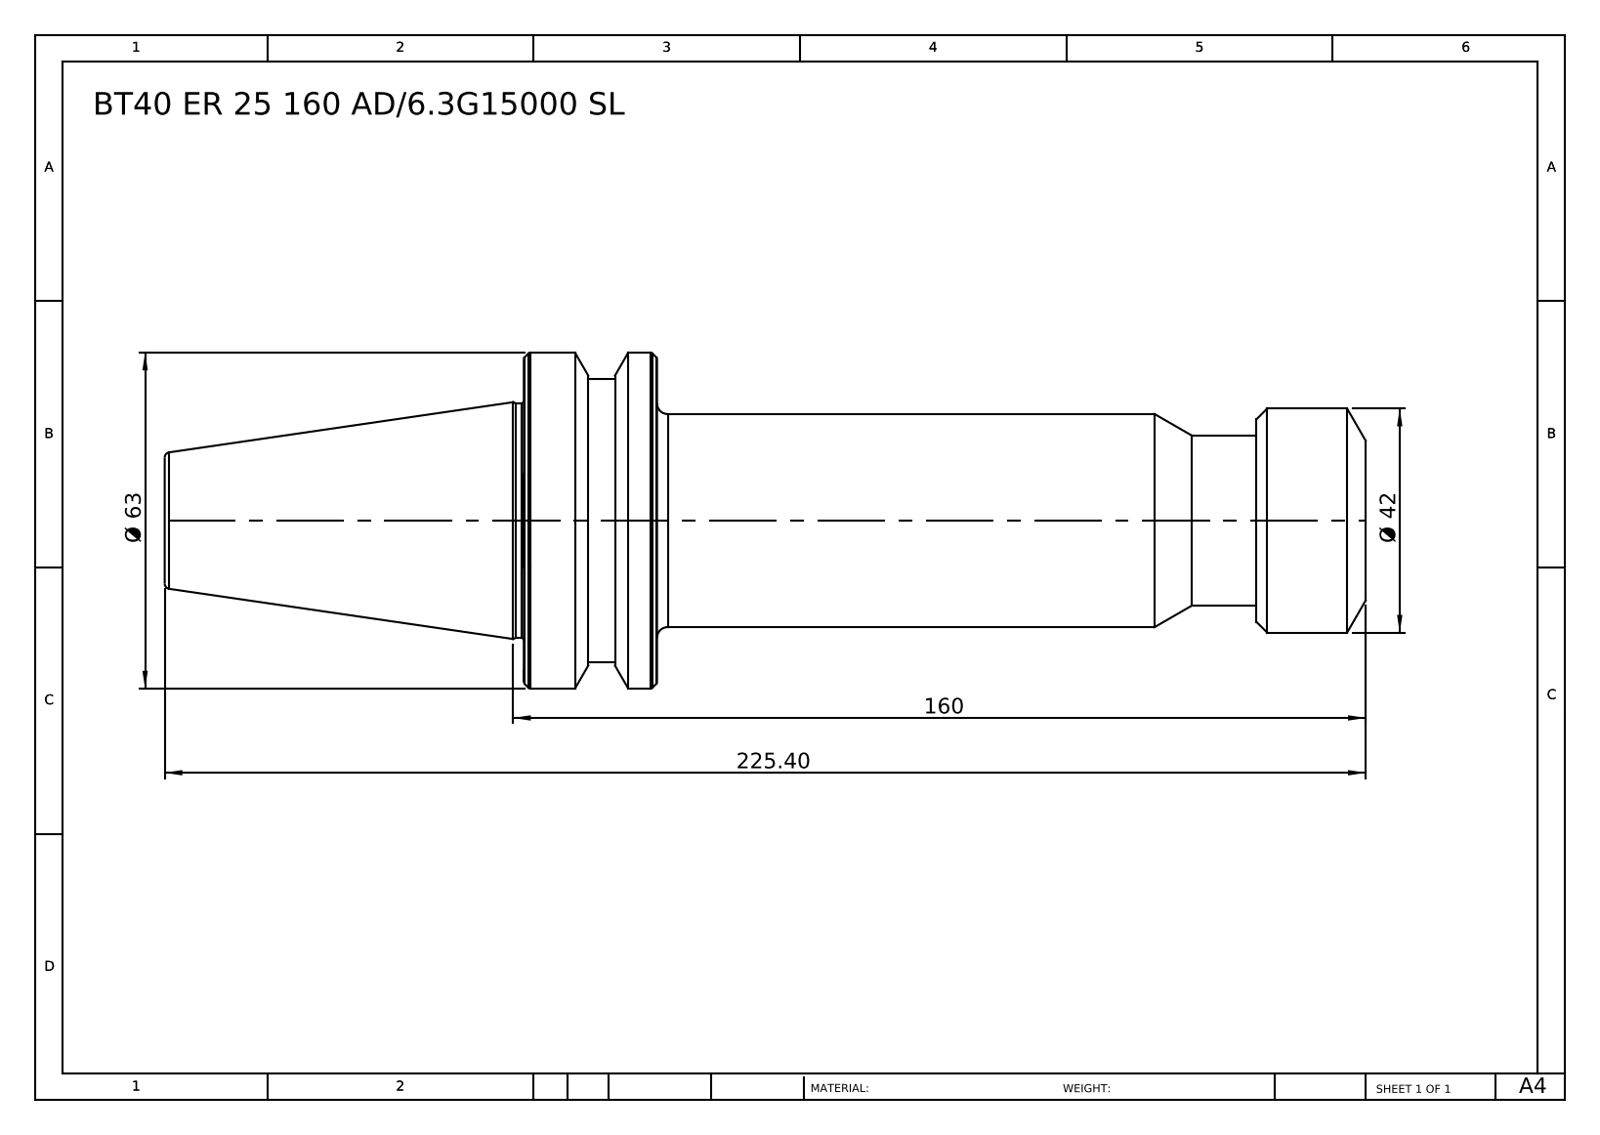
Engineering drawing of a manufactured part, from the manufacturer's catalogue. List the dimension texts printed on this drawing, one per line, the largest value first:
225.40
160
Ø 63
Ø 42
